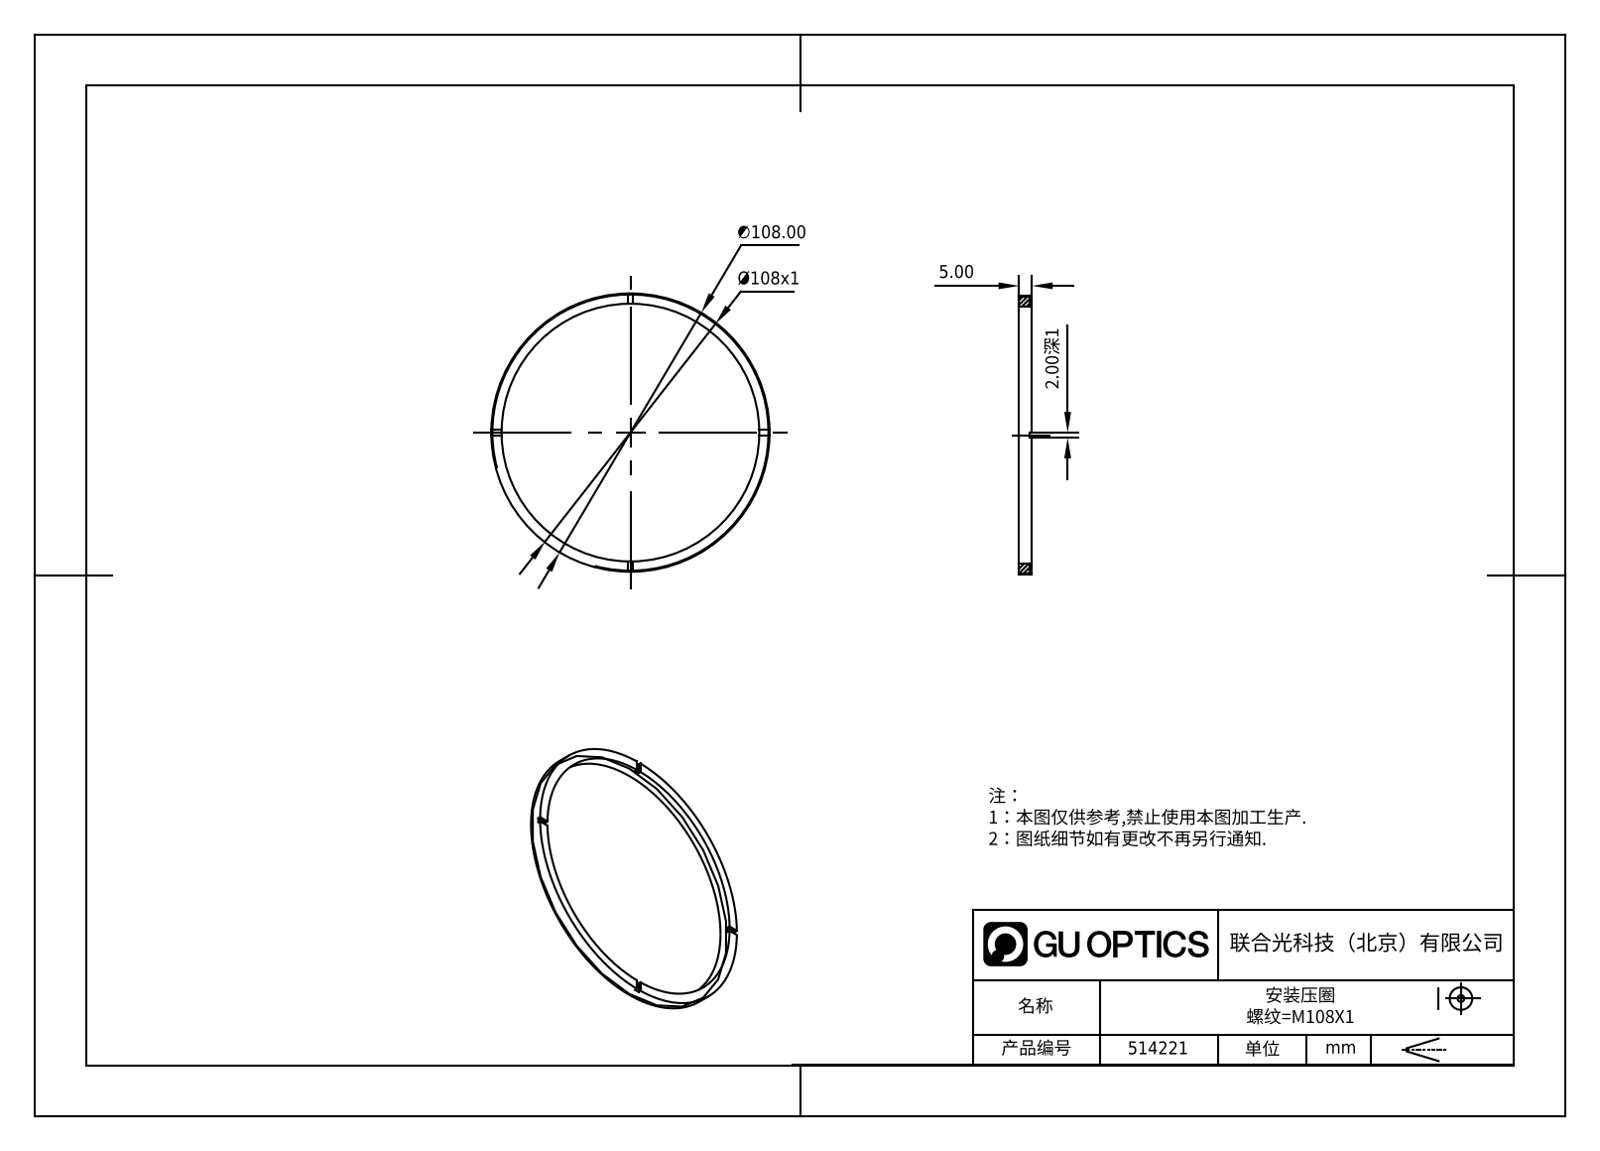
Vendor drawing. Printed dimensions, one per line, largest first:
∅108.00
Ø108x1
5.00
2.00深1
